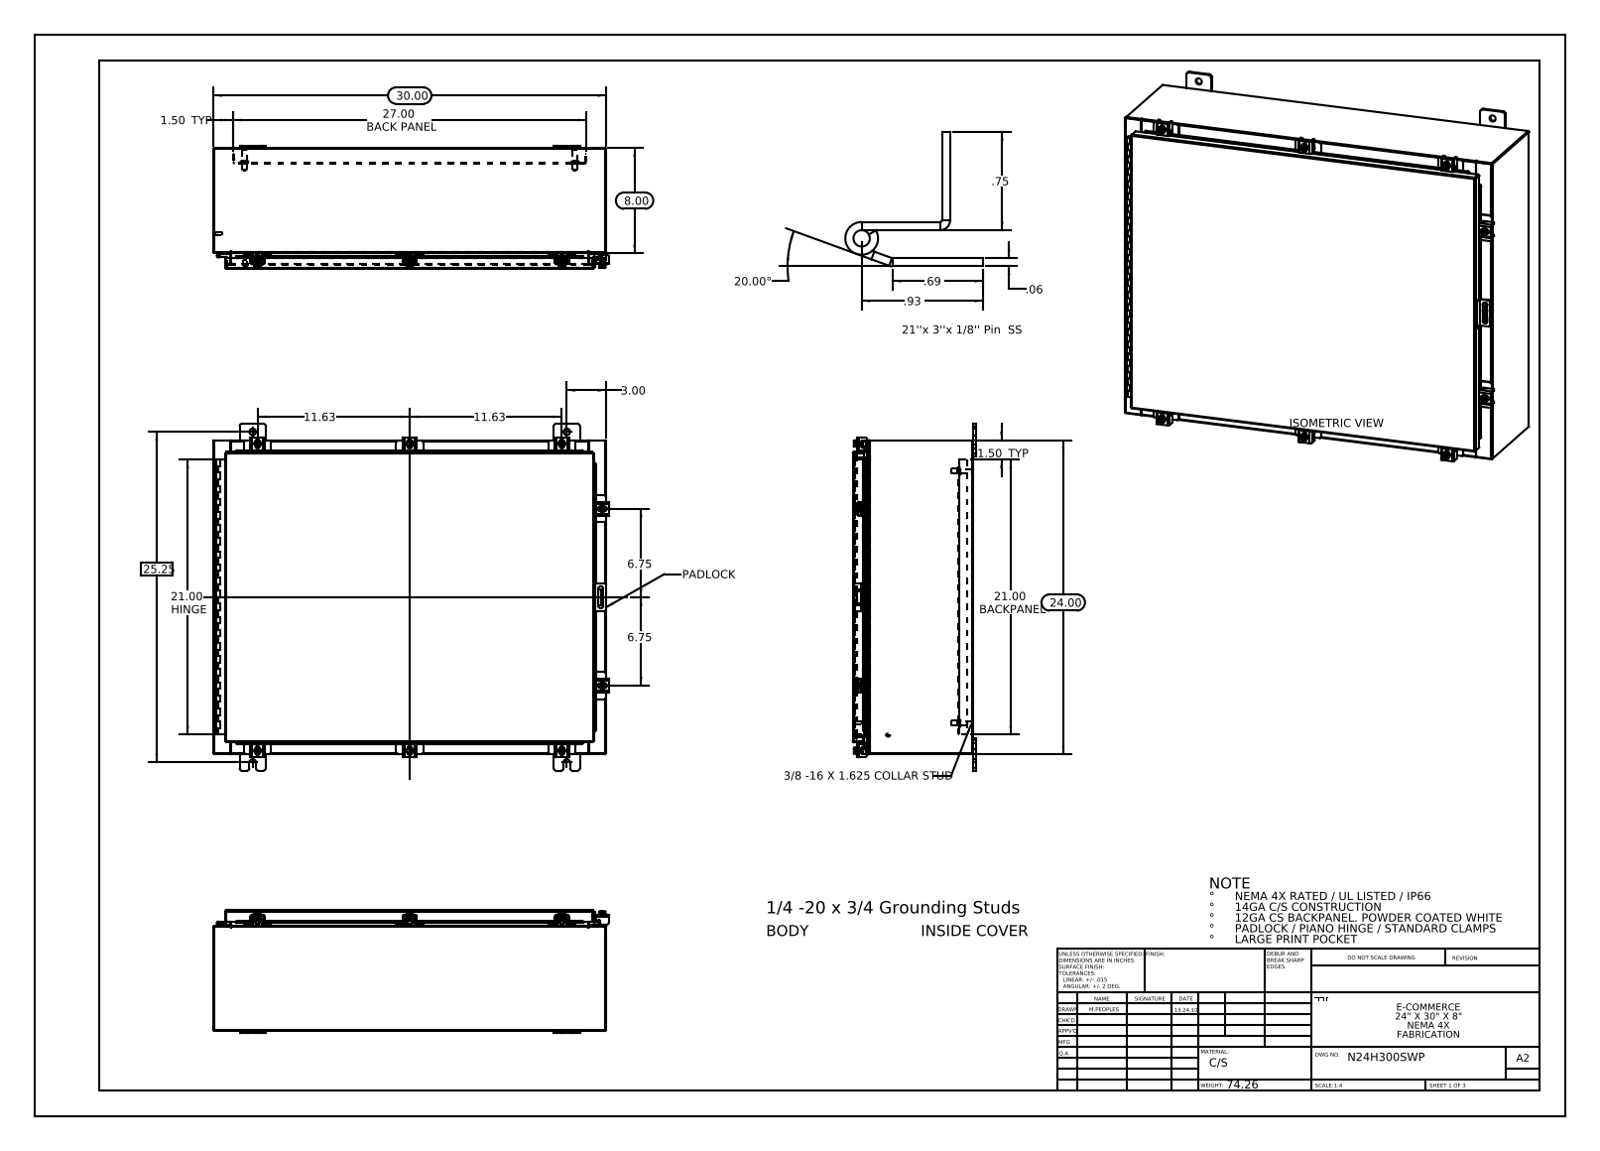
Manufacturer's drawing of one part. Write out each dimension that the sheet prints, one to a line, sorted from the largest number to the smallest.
30.00
27.00 BACK PANEL
25.25
24.00
21.00 HINGE
21.00 BACKPANEL
20.00°
11.63
11.63
8.00
6.75
6.75
3.00
1.50 TYP
1.50 TYP
.93
.75
.69
.06
